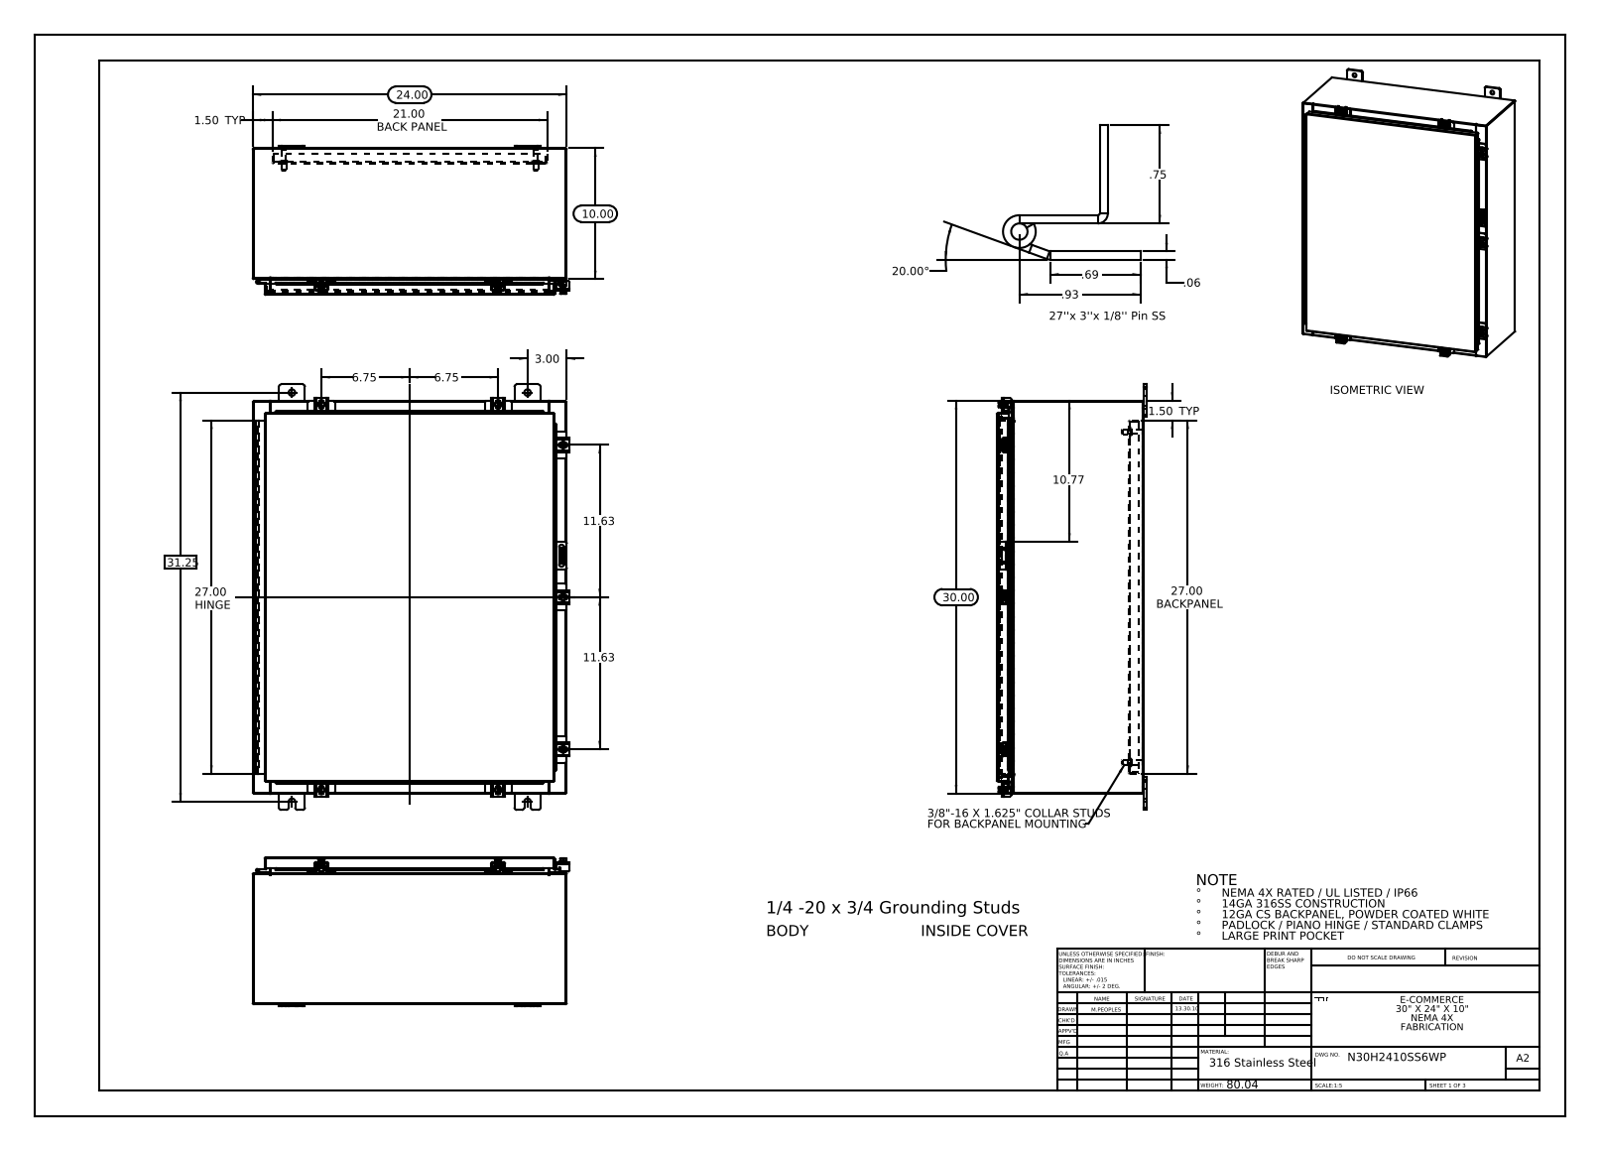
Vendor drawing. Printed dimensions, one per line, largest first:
31.25
30.00
27.00 HINGE
27.00 BACKPANEL
24.00
21.00 BACK PANEL
20.00°
11.63
11.63
10.77
10.00
6.75
6.75
3.00
1.50 TYP
1.50 TYP
.93
.75
.69
.06
